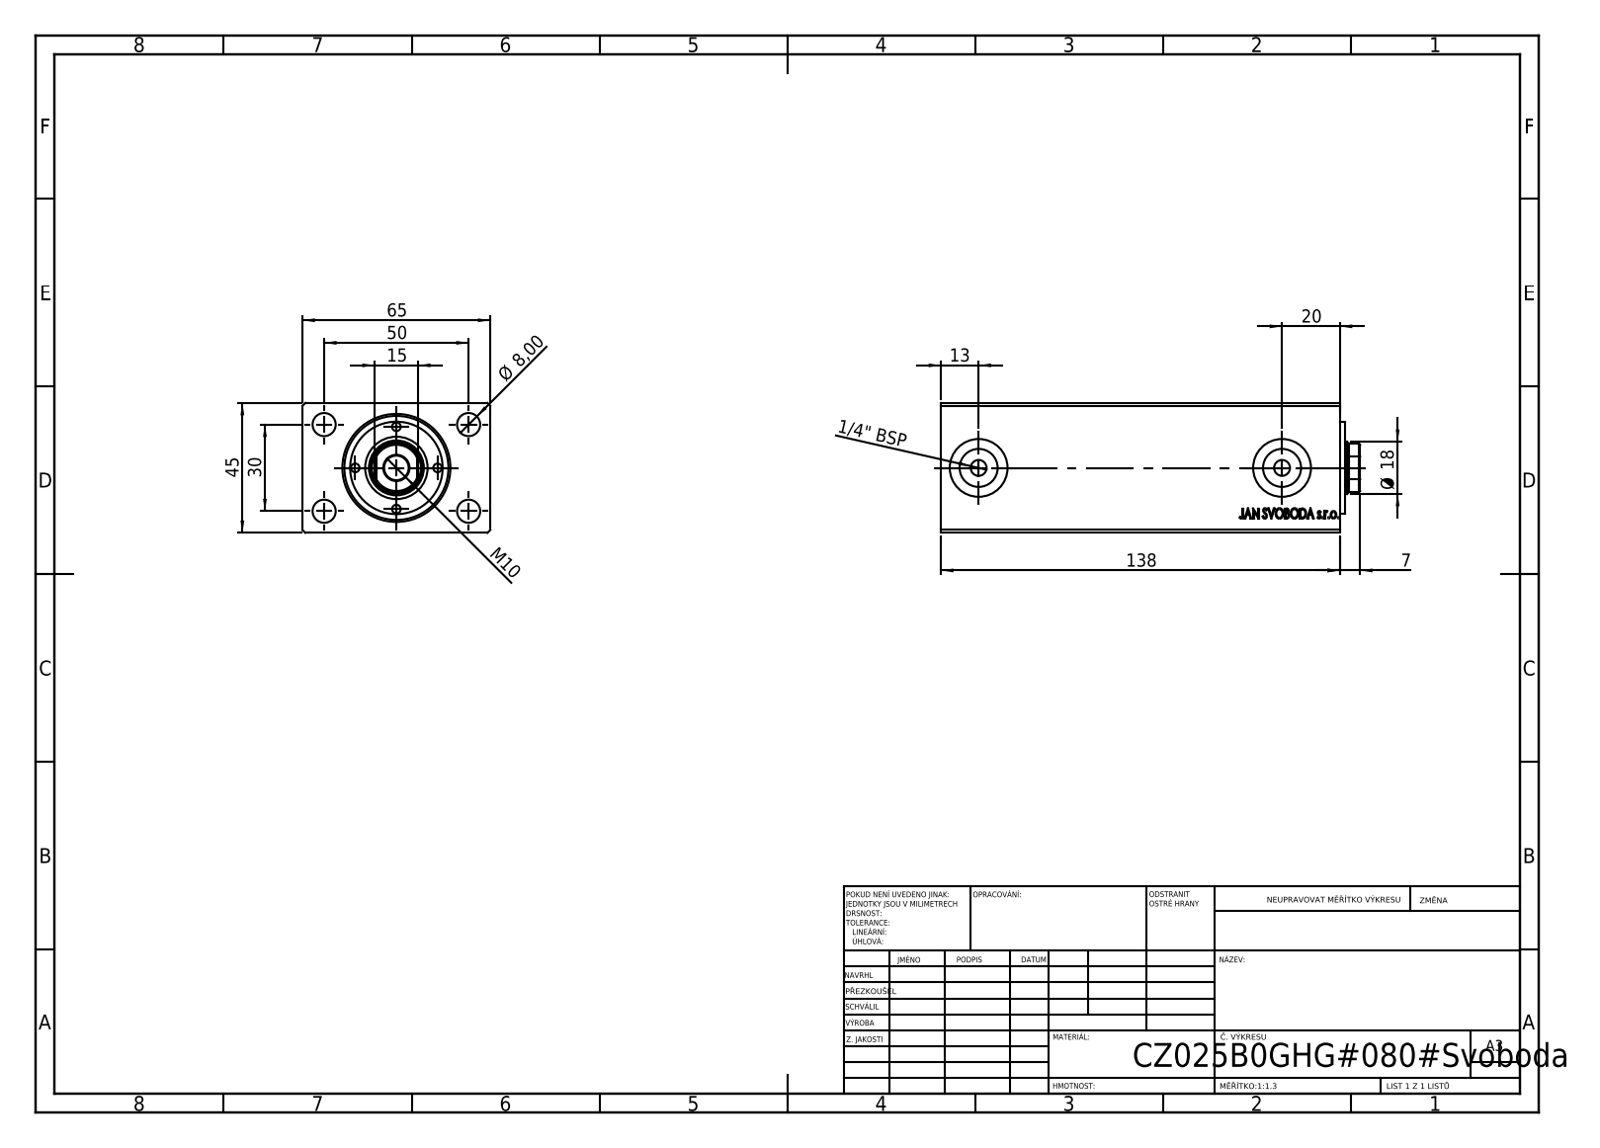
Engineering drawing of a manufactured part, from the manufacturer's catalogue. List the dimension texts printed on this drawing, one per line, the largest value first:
138
65
50
45
30
20
Ø 18
15
13
M10
Ø 8,00
7
1/4" BSP
